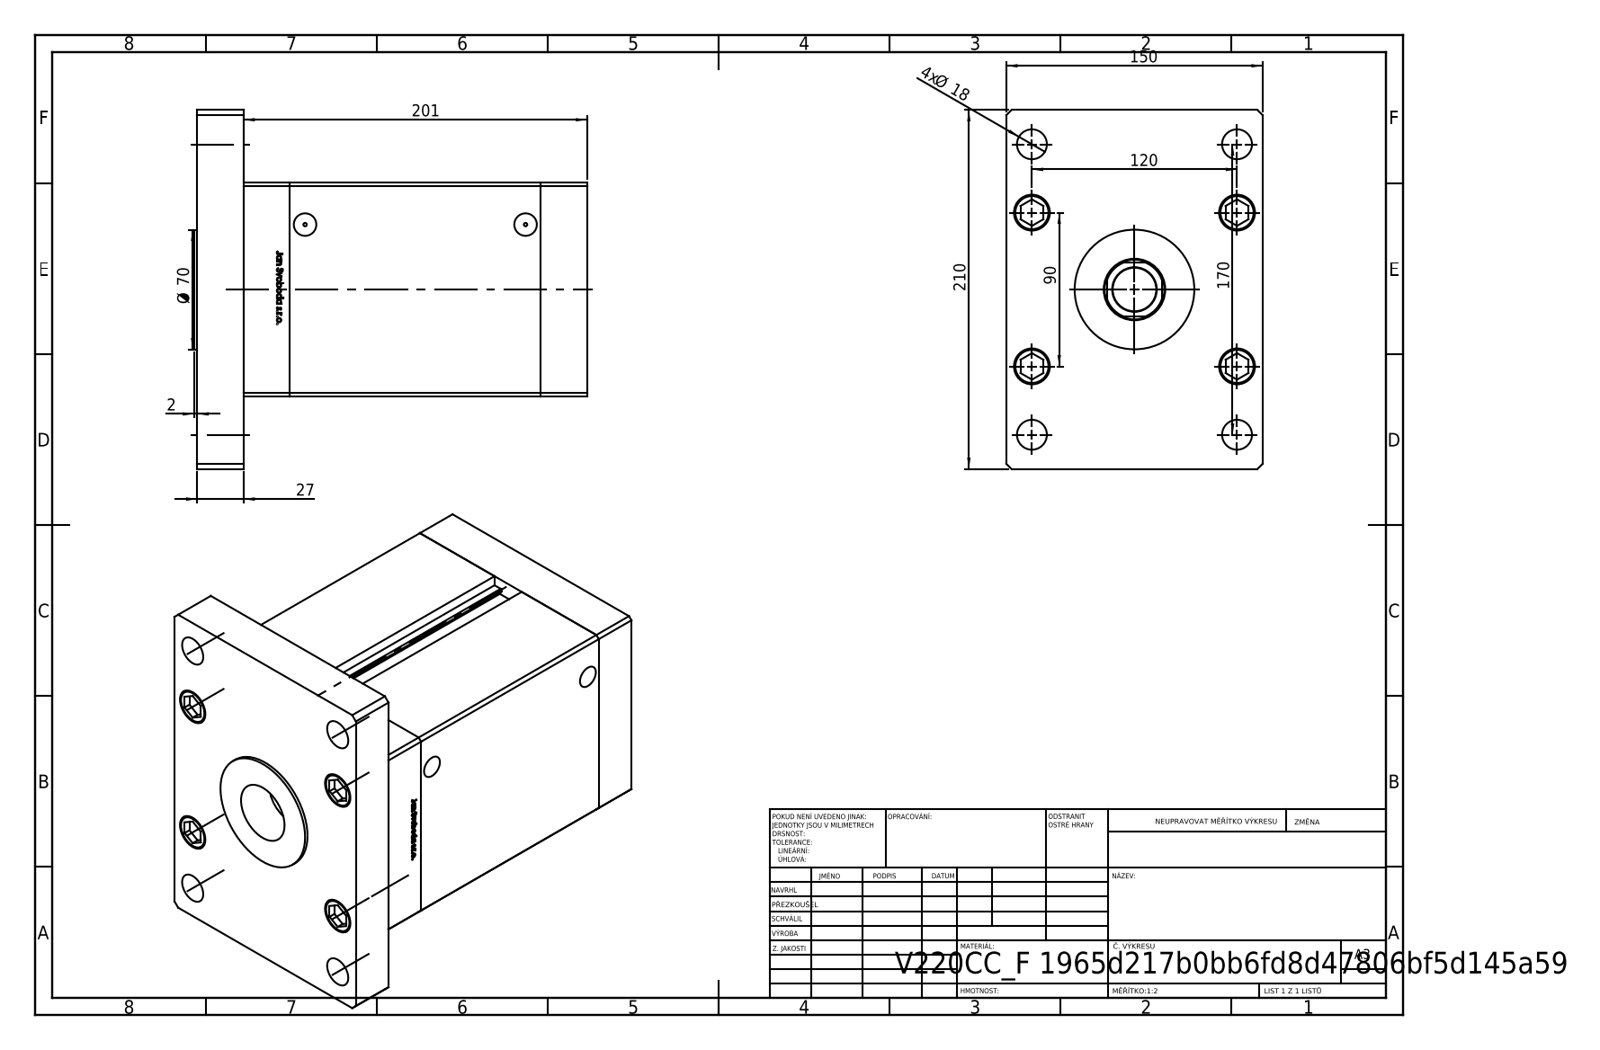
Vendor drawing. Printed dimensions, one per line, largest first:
210
201
170
150
120
90
Ø 70
27
4x Ø 18
2
